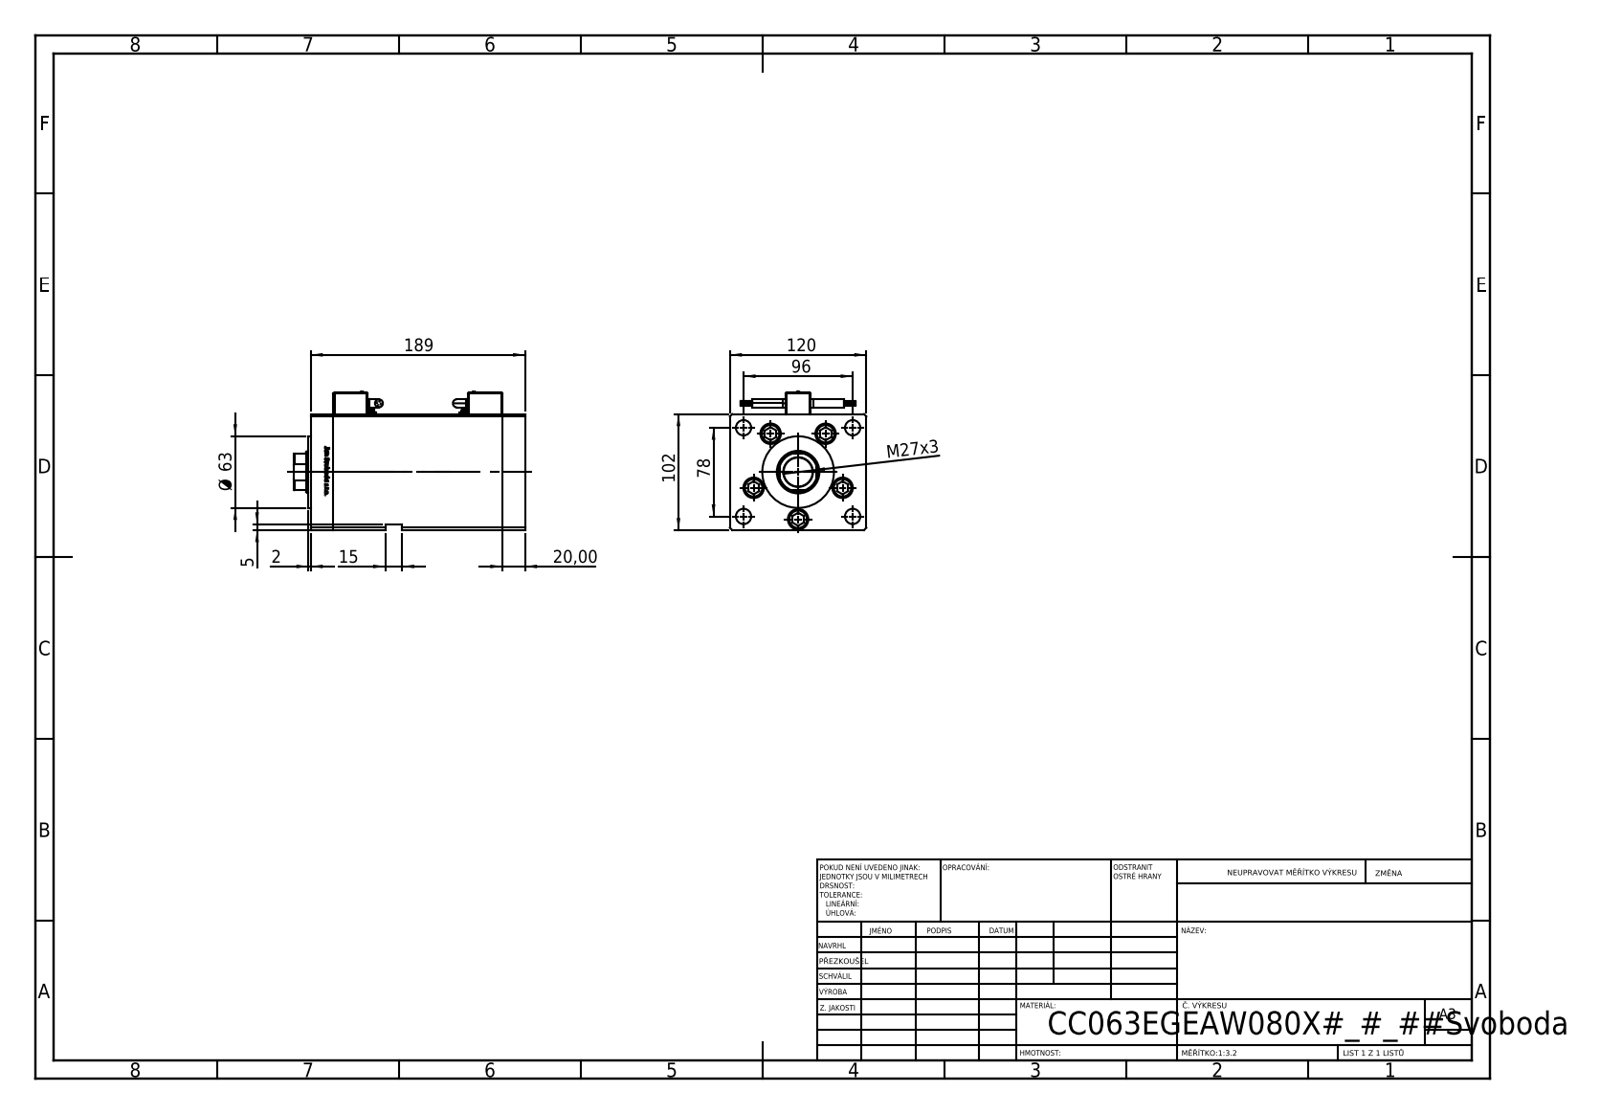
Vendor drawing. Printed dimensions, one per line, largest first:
189
120
102
96
78
Ø 63
M27x3
20,00
15
5
2
